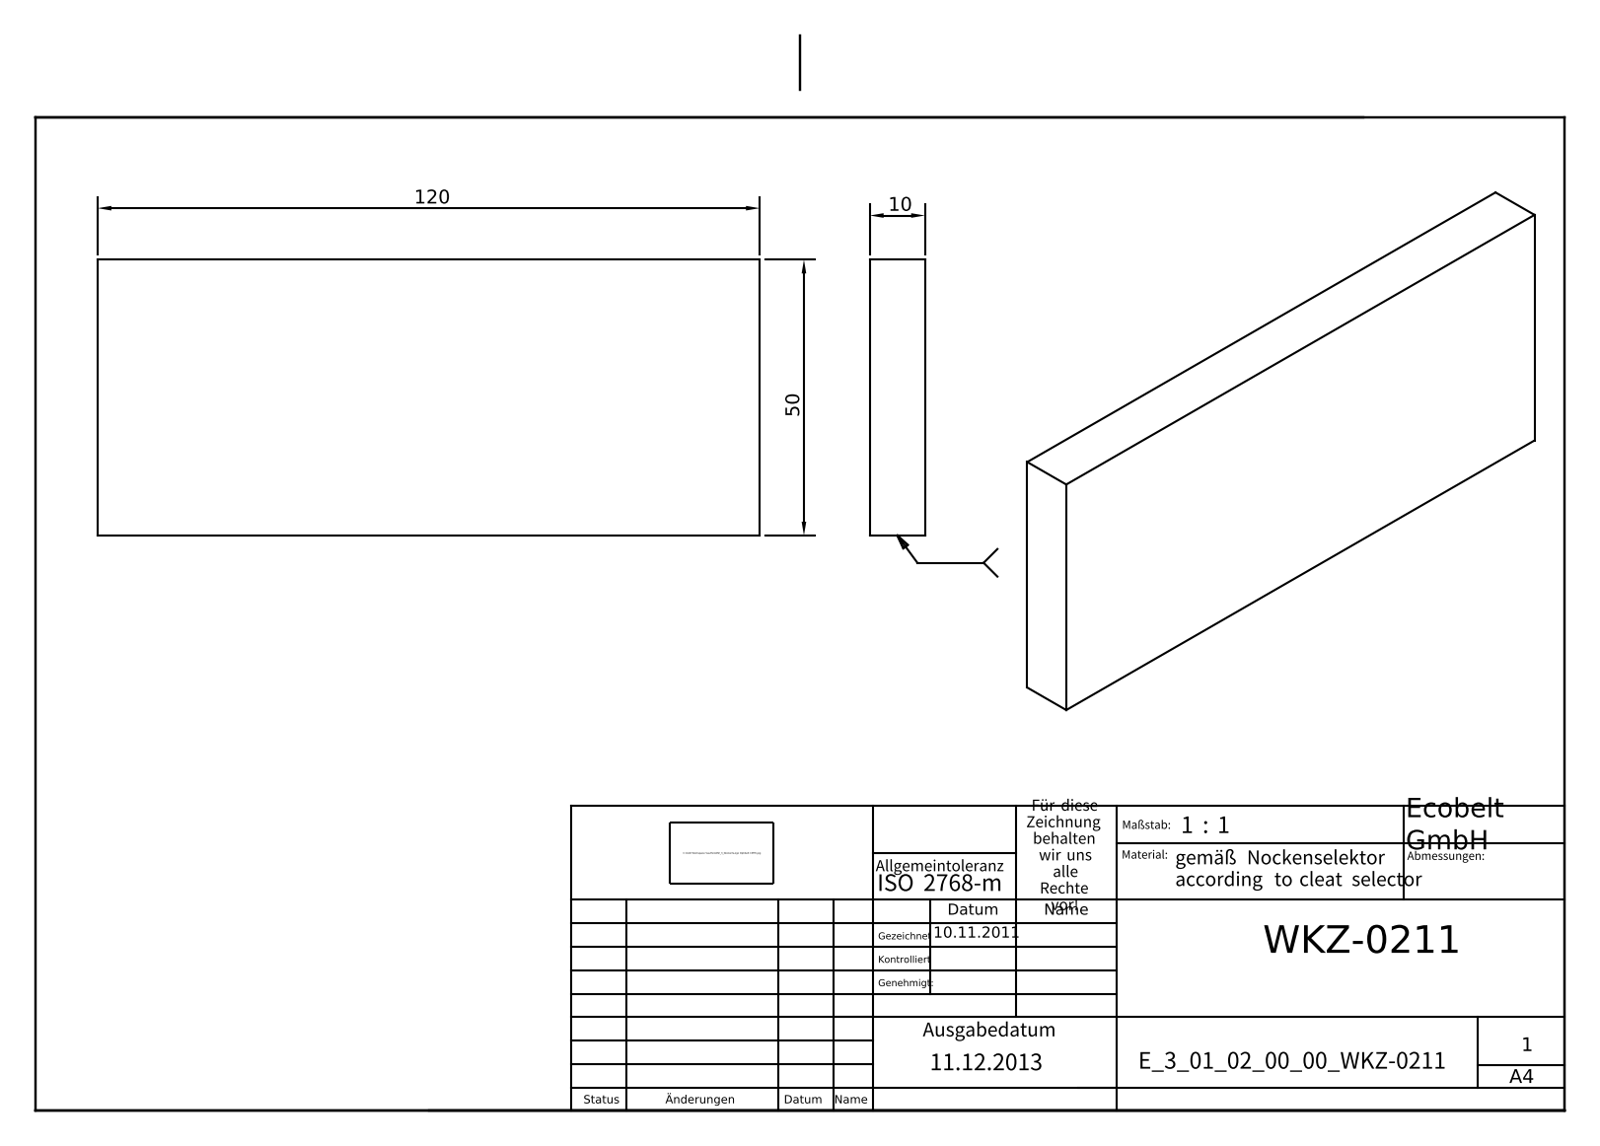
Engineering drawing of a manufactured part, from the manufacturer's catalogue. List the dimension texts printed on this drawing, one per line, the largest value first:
120
50
10
